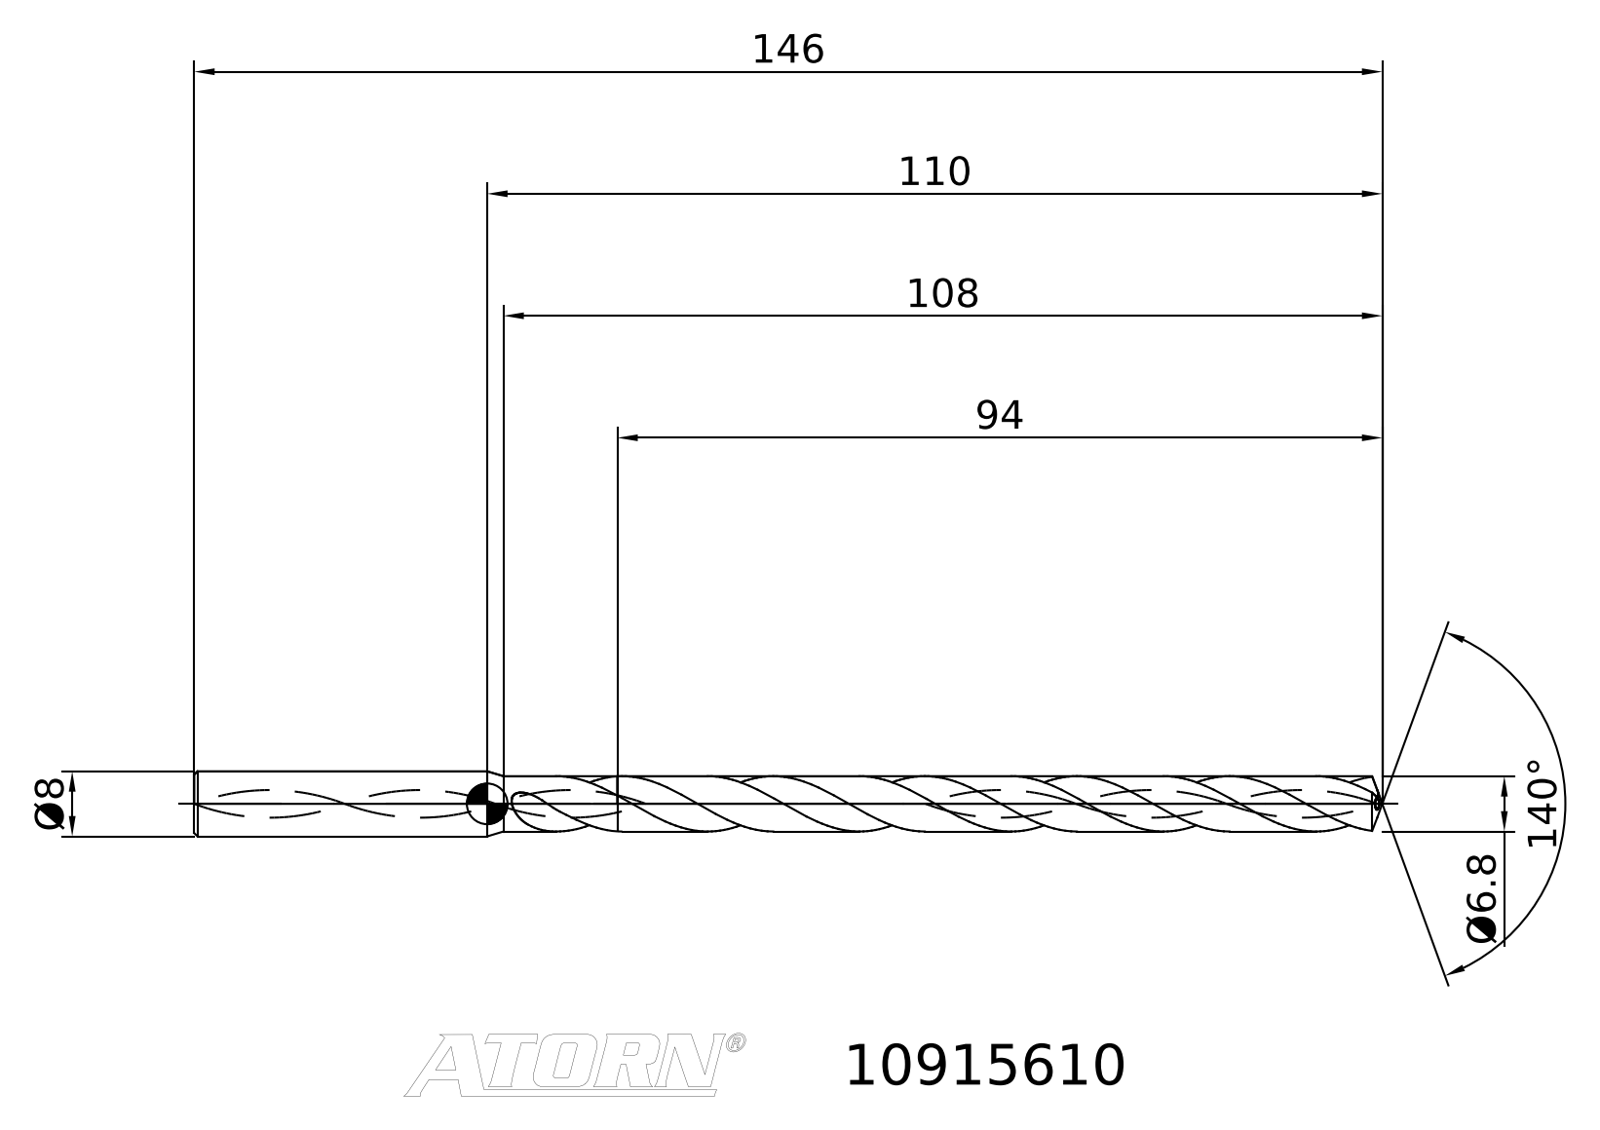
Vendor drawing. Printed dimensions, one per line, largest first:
146
140°
110
108
94
Ø8
Ø6.8
